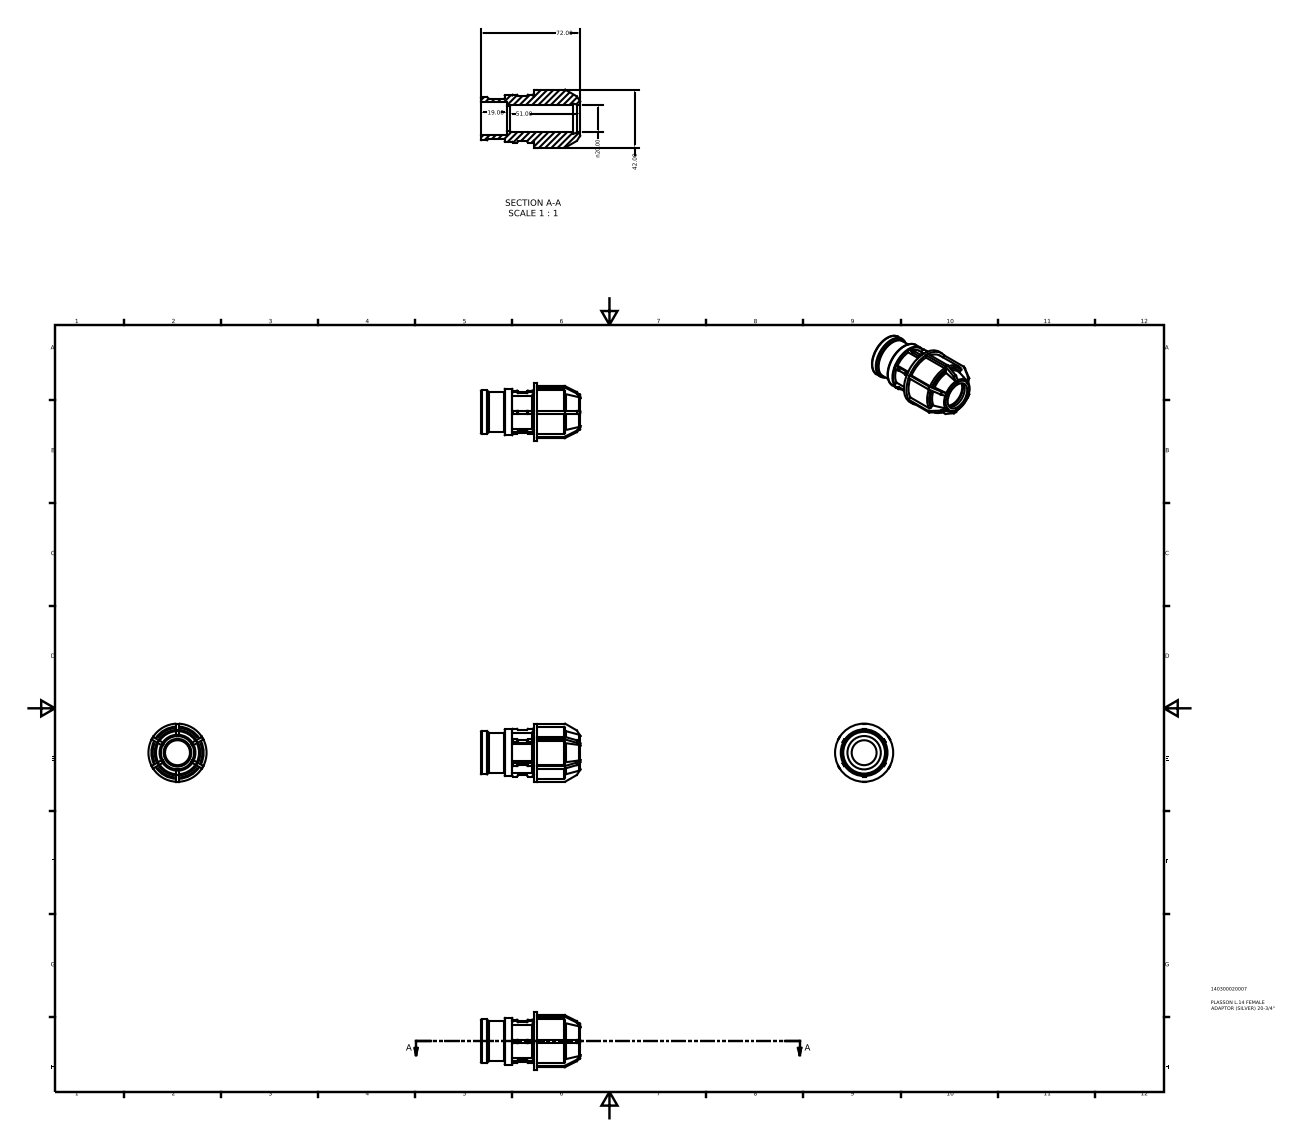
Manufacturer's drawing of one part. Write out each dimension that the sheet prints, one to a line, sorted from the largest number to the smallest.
72.00
51.00
42.00
n20.00
19.00
